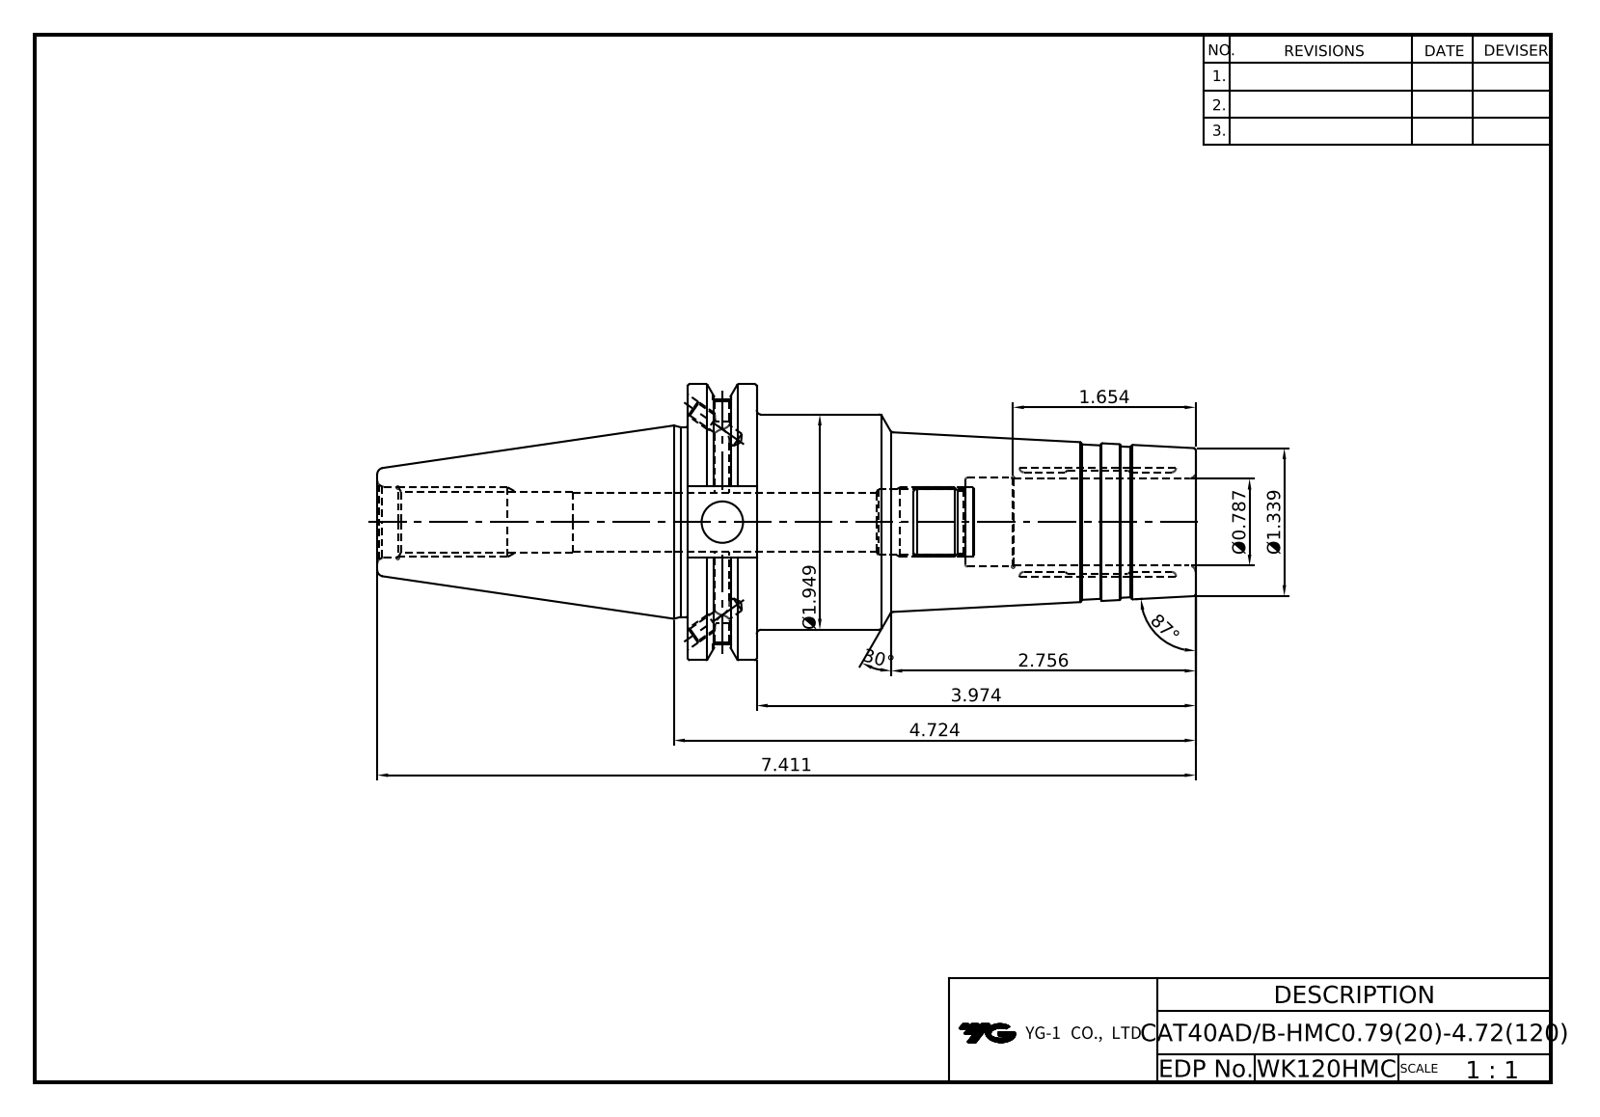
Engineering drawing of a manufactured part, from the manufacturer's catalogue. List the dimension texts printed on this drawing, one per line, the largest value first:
87°
30°
7.411
4.724
3.974
2.756
Ø1.949
1.654
Ø1.339
Ø0.787
